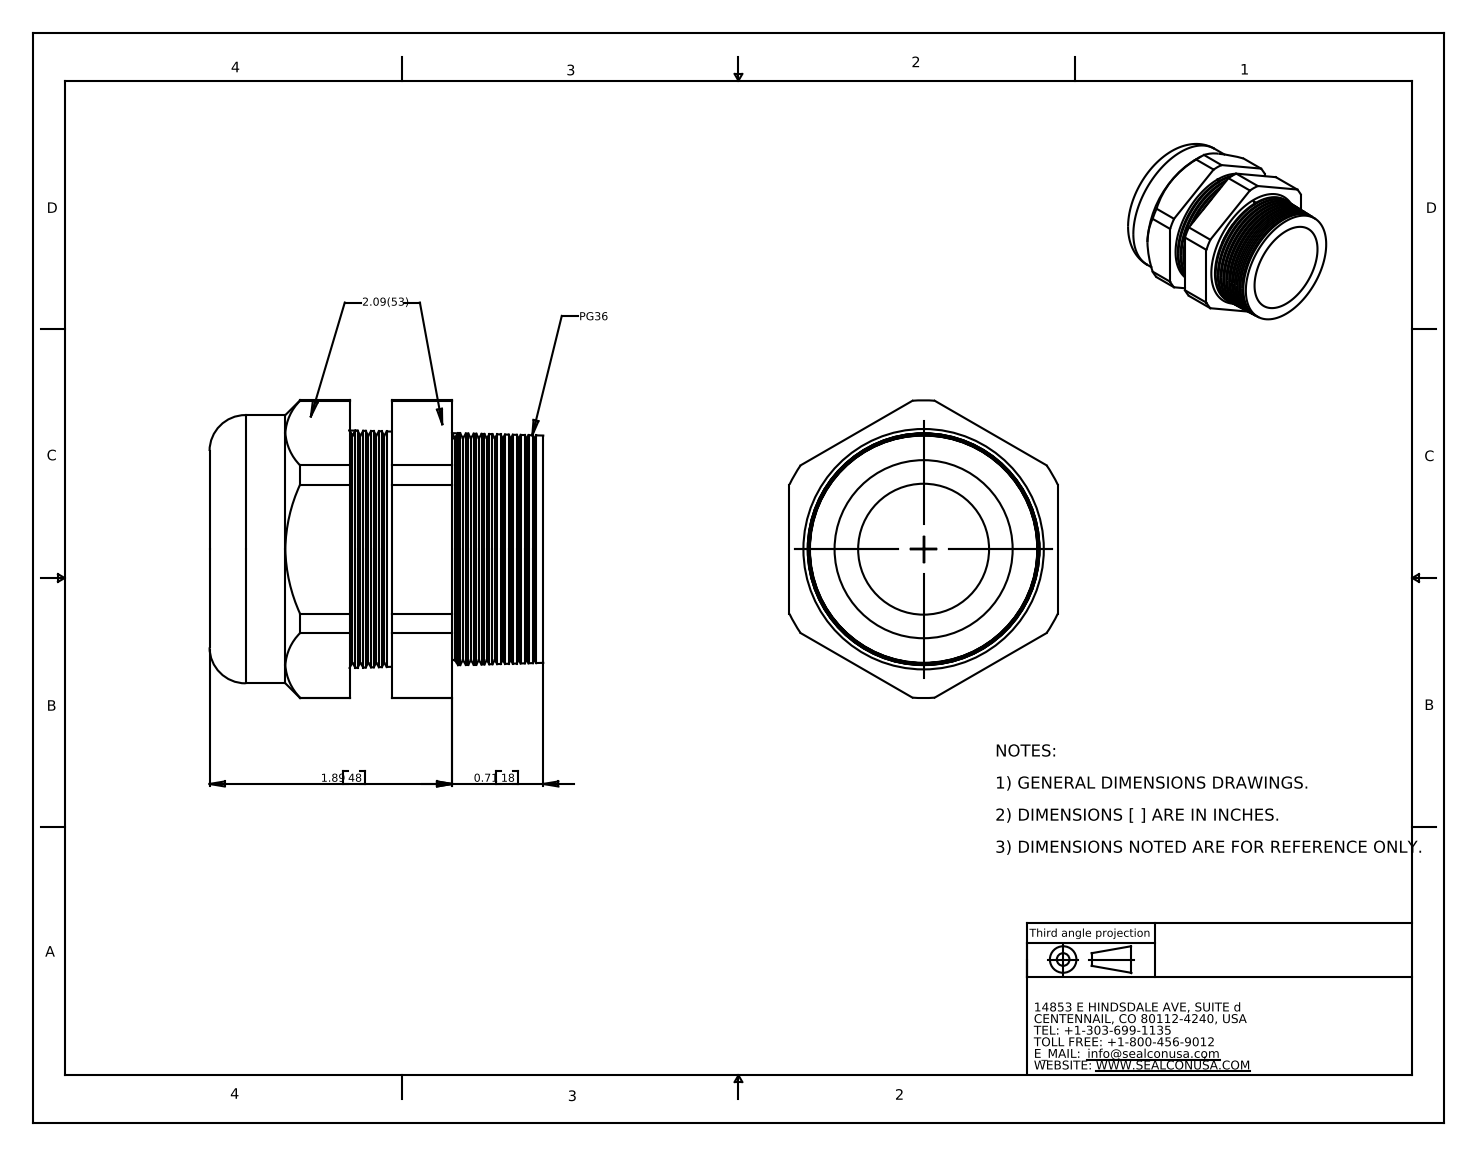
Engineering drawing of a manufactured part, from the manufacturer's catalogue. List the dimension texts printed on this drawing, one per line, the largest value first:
1.89 48
0.71 18
